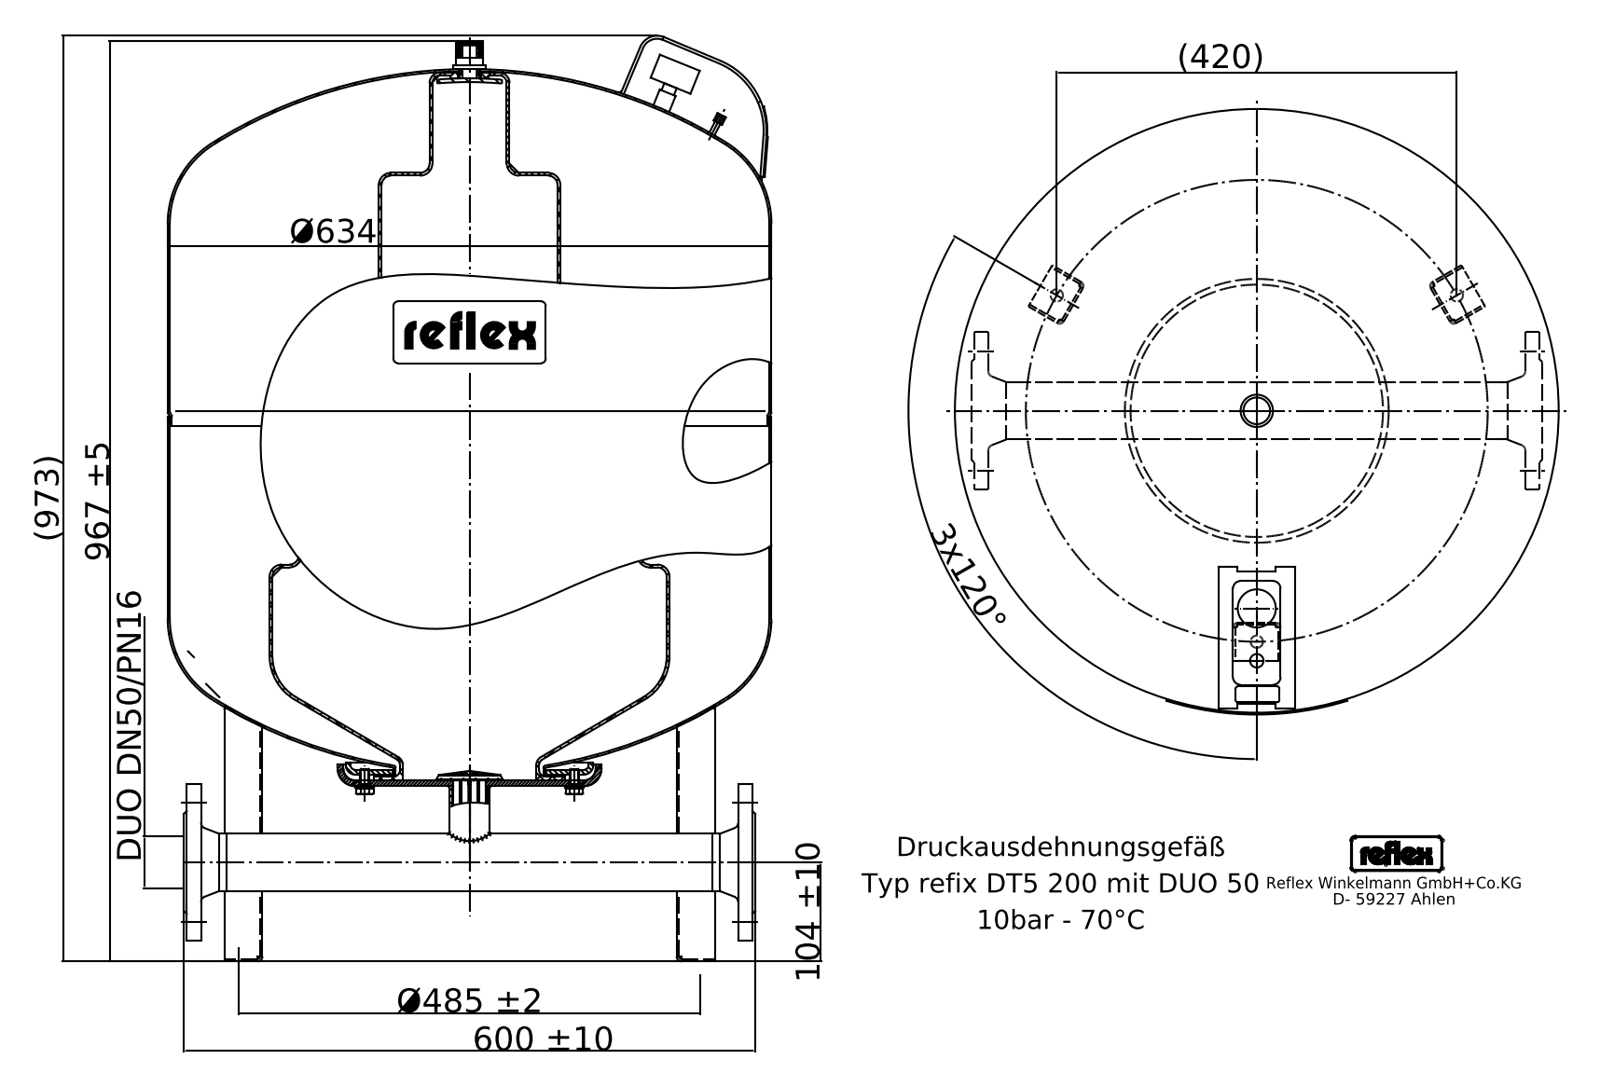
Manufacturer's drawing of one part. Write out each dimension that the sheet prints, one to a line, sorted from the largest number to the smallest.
(973)
967 ±5
Ø634
600 ±10
Ø485 ±2
(420)
3x120°
104 ±10
DUO DN50/PN16
